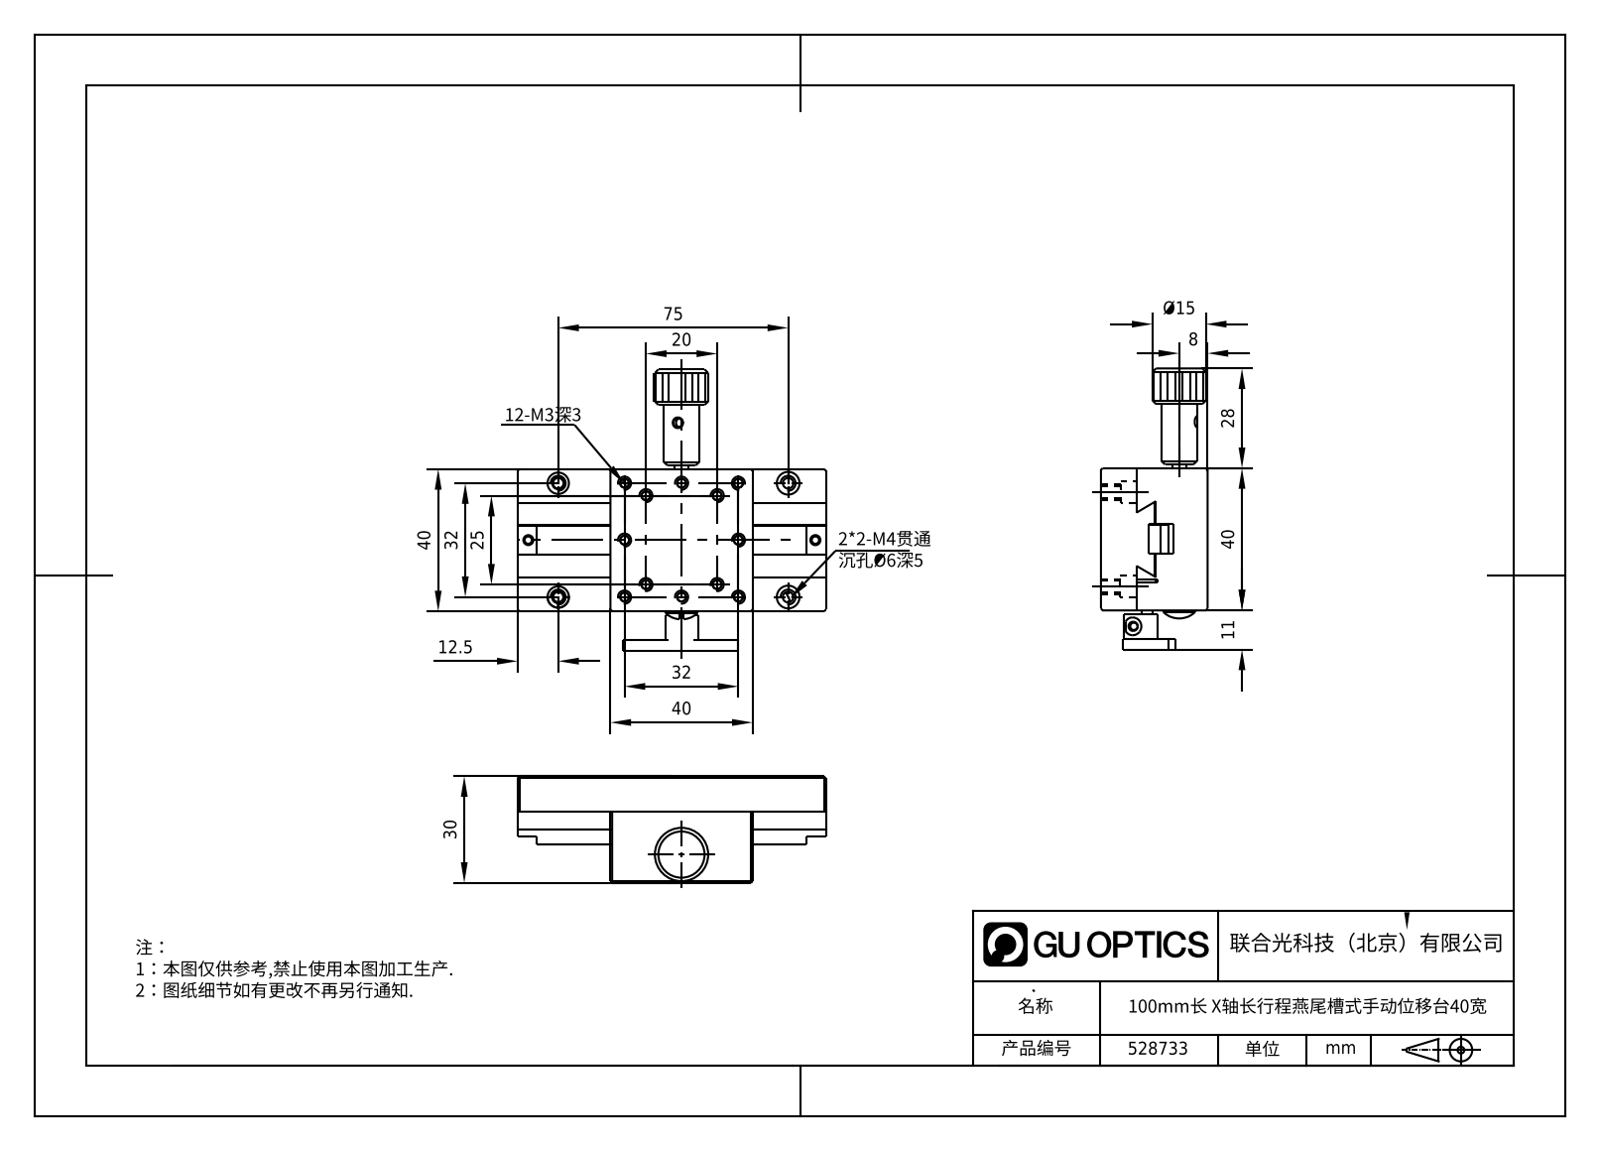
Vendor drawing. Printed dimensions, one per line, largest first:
75
40
40
40
32
32
30
28
25
20
Ø15
12.5
11
8
